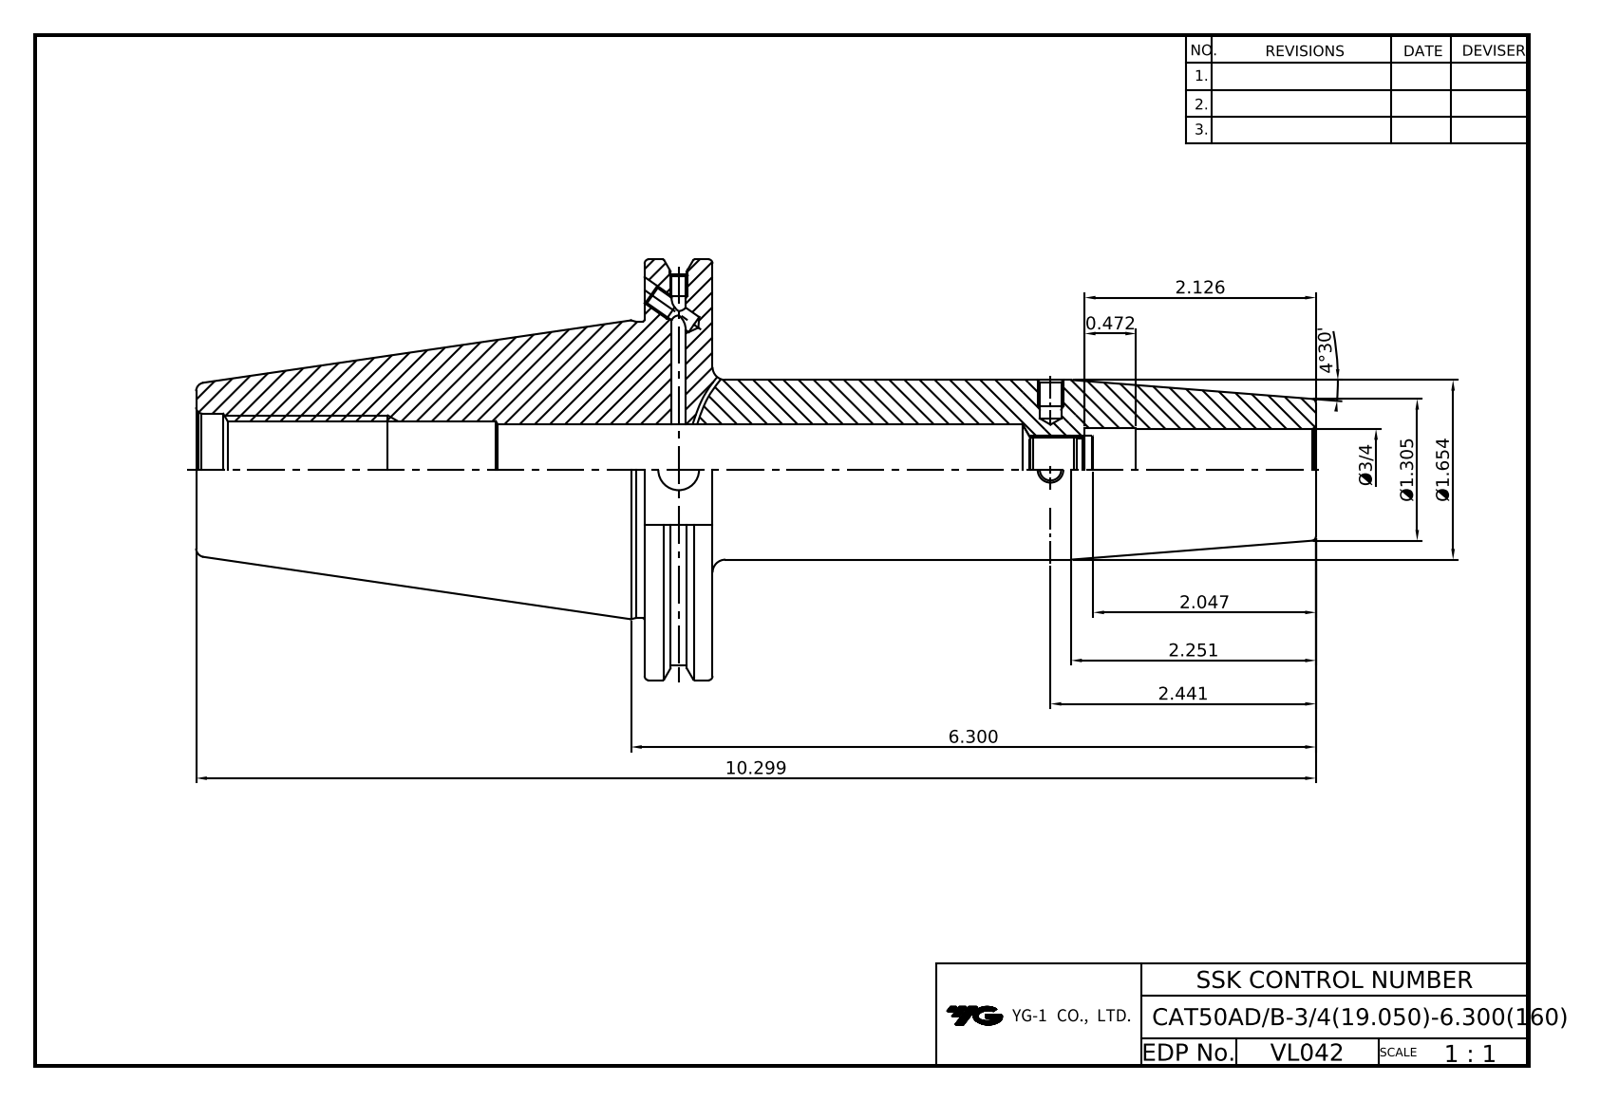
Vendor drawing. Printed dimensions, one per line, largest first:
10.299
6.300
2.441
2.251
2.126
2.047
Ø1.654
Ø1.305
Ø3/4
0.472
